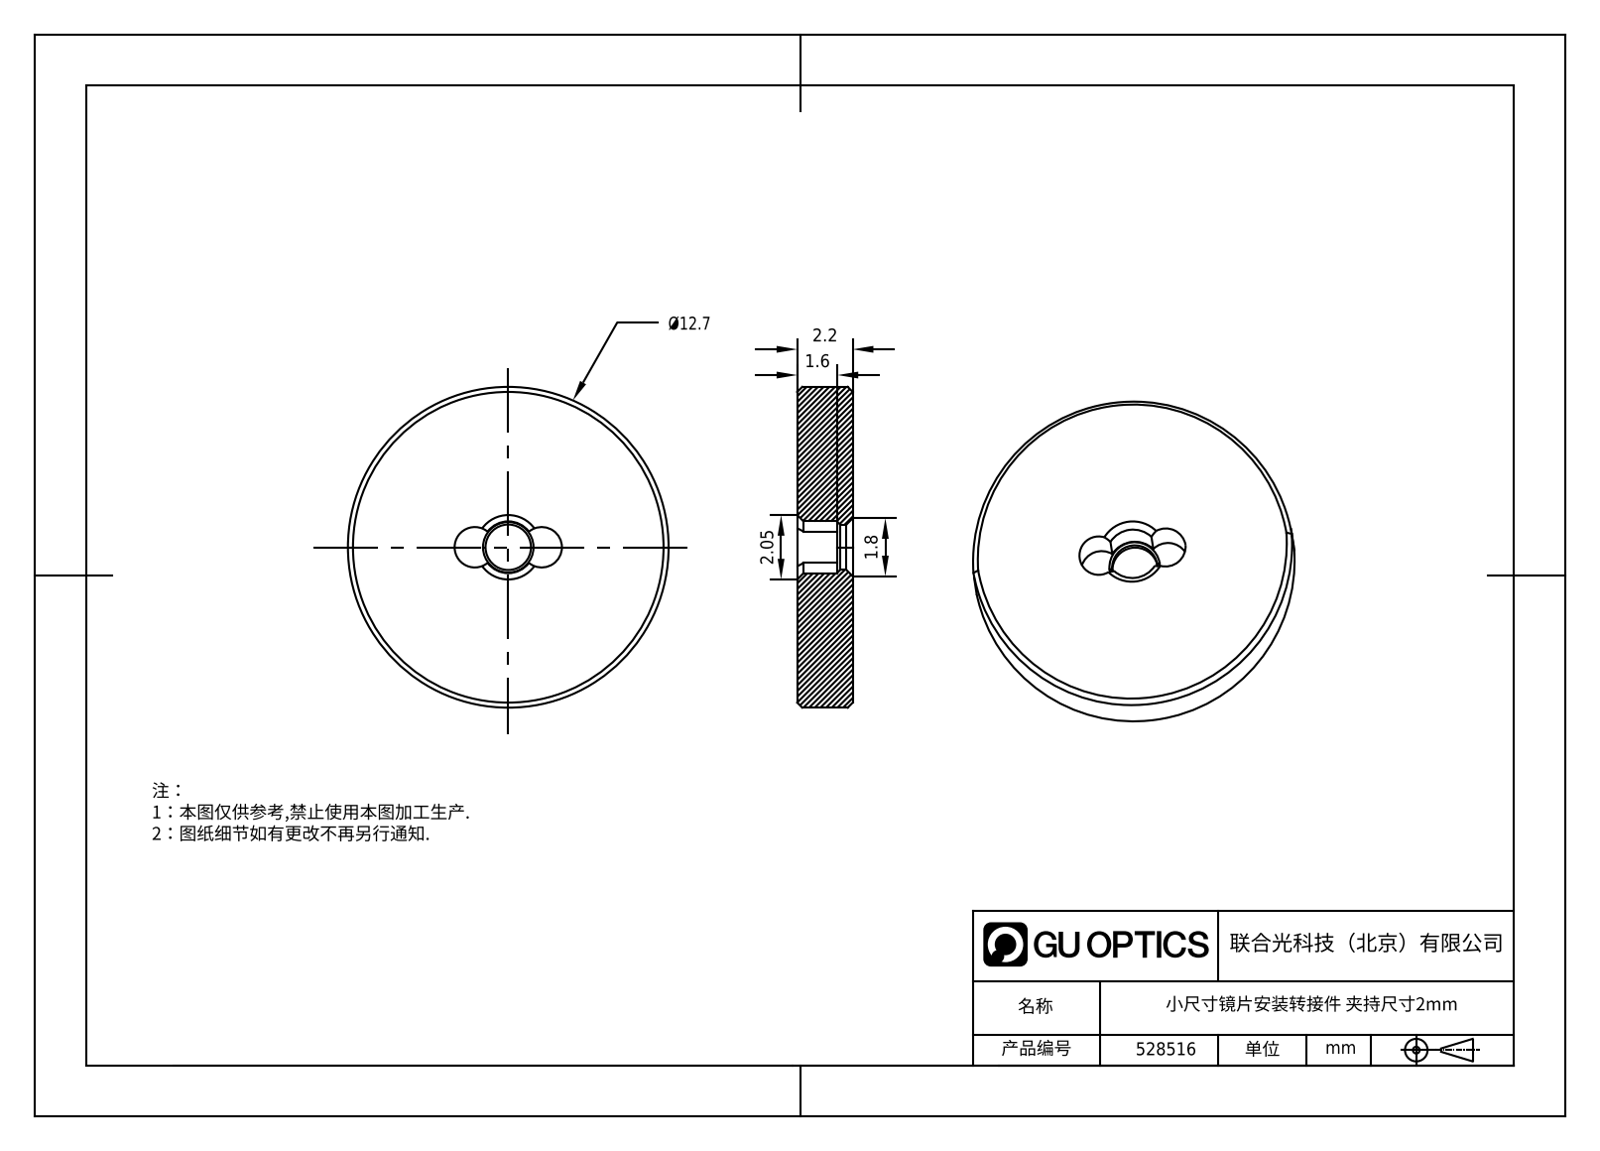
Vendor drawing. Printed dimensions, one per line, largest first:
2.2
2.05
1.8
1.6
